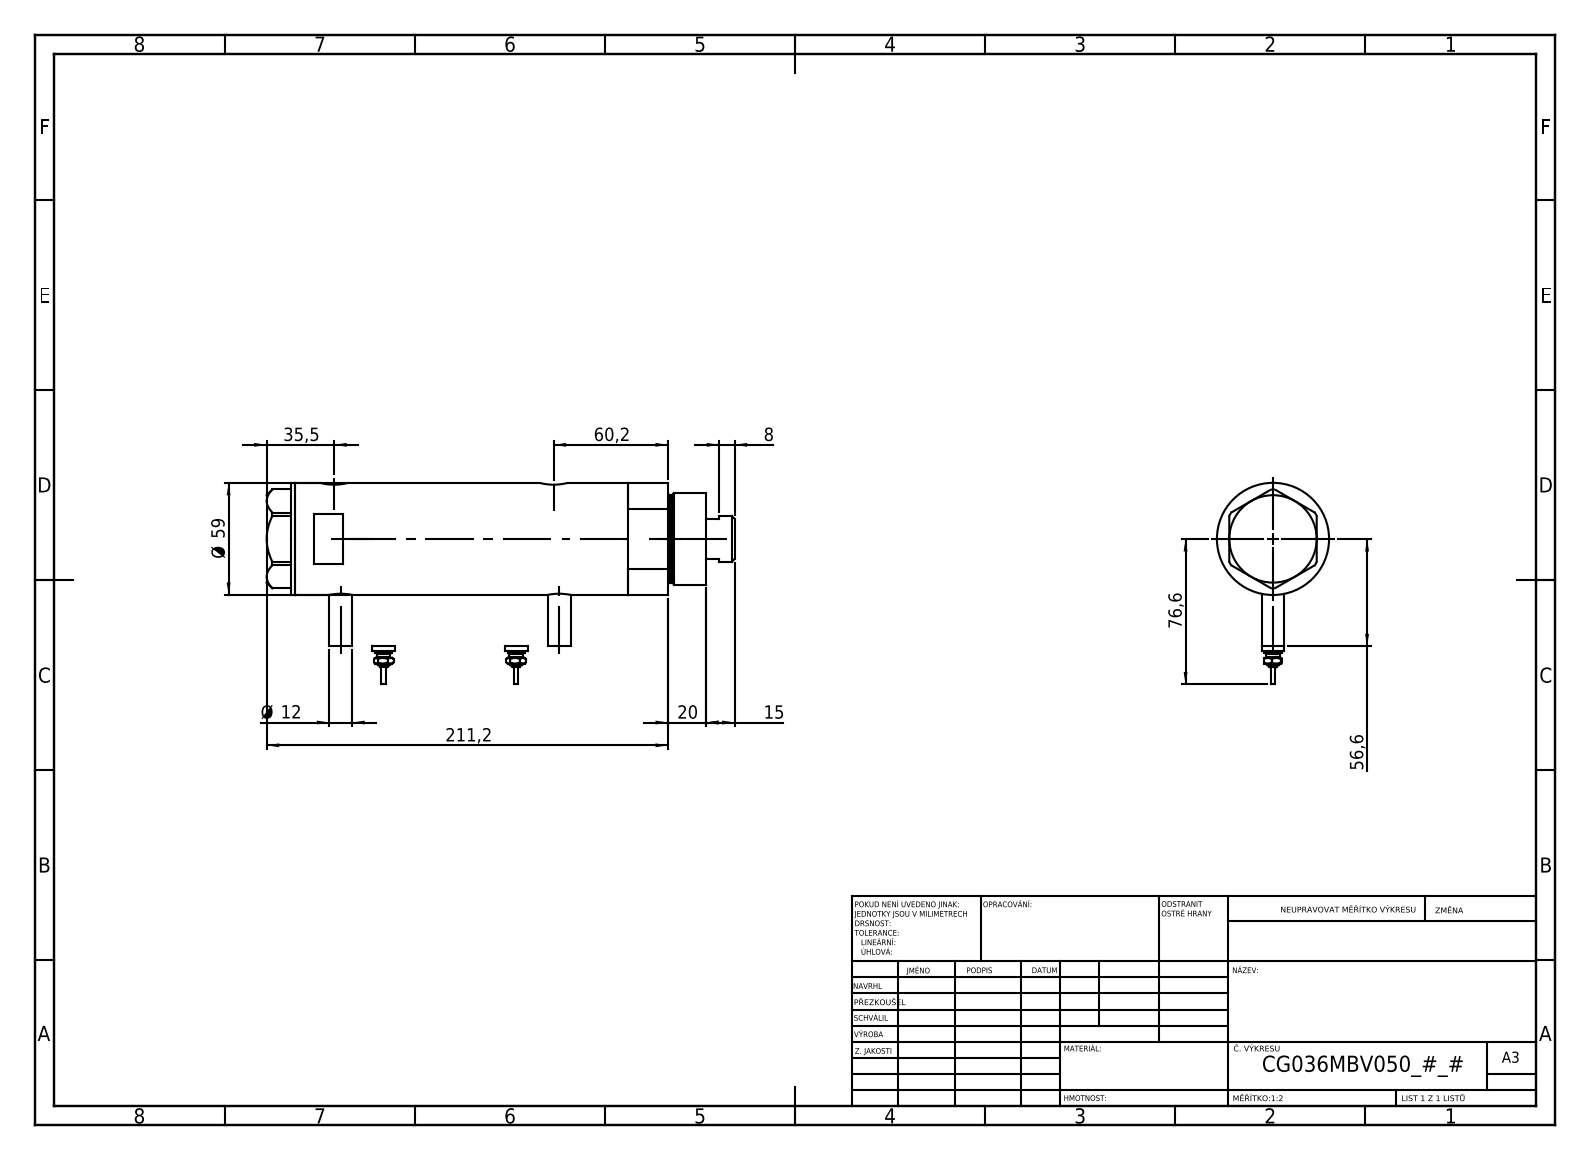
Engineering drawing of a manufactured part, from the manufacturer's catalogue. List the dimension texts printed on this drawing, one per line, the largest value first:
211,2
76,6
60,2
Ø 59
56,6
35,5
20
15
Ø 12
8
